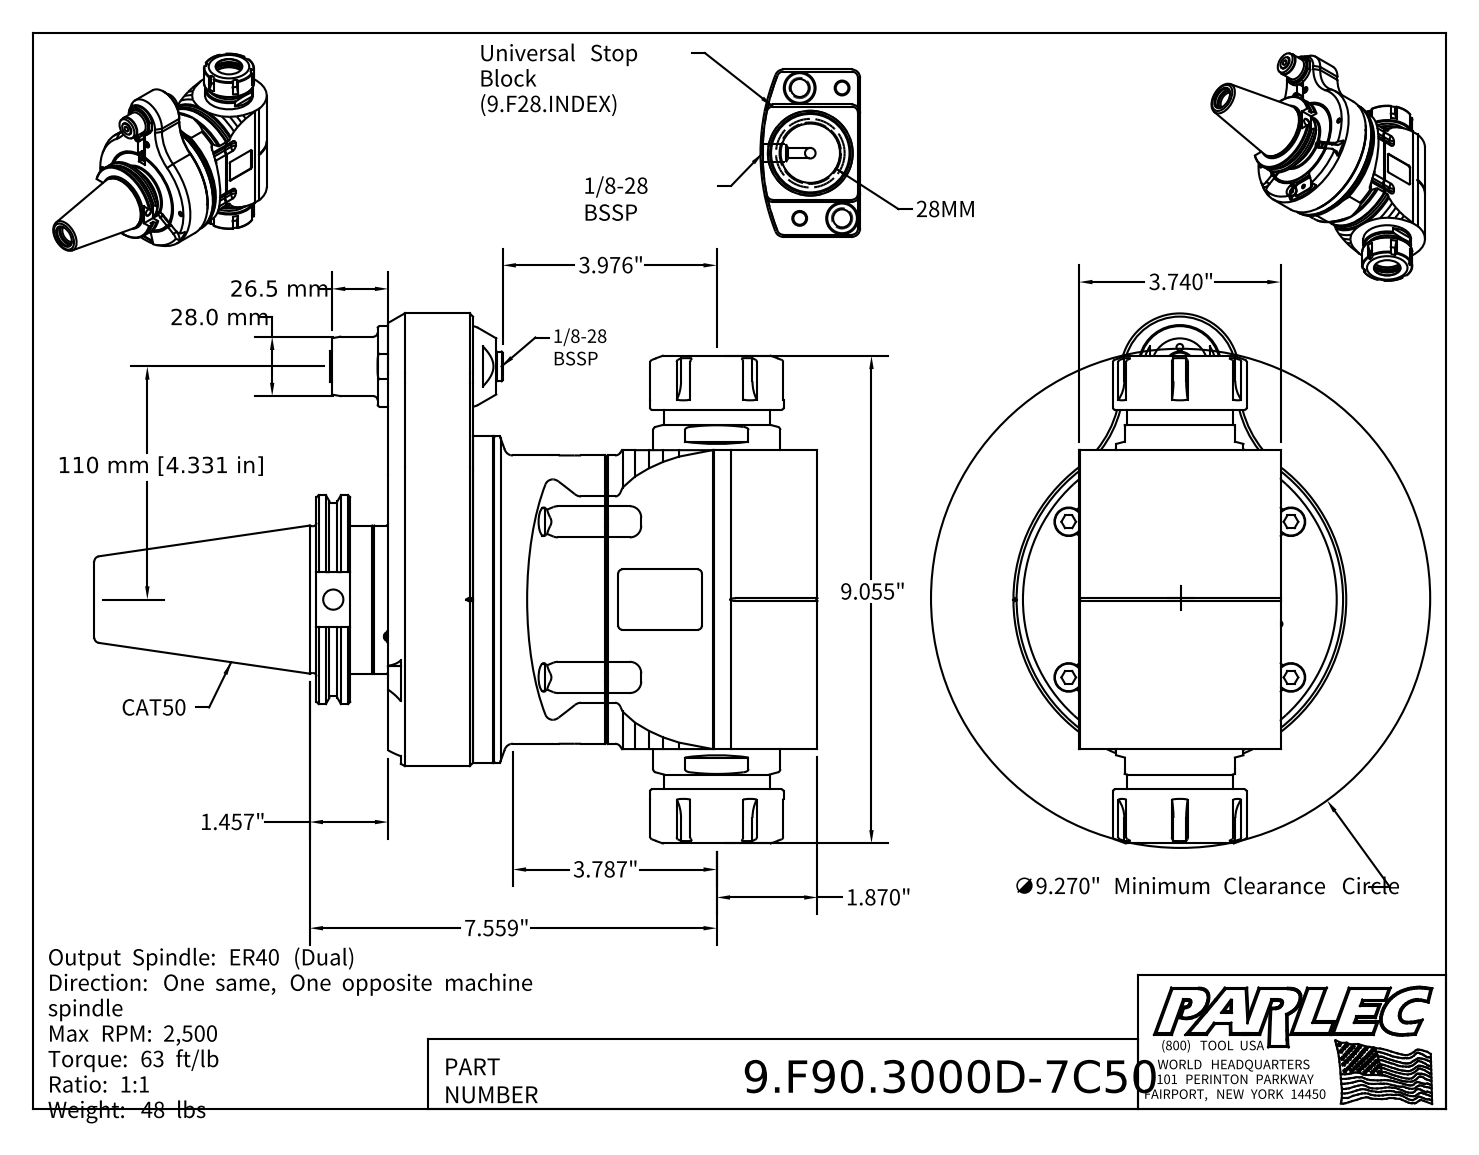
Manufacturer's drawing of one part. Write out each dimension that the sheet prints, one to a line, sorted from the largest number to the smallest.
110 mm [4.331 in]
28.0 mm
26.5 mm
∅9.270" Minimum Clearance Circle
9.055"
7.559"
3.976"
3.787"
3.740"
1.870"
1.457"
